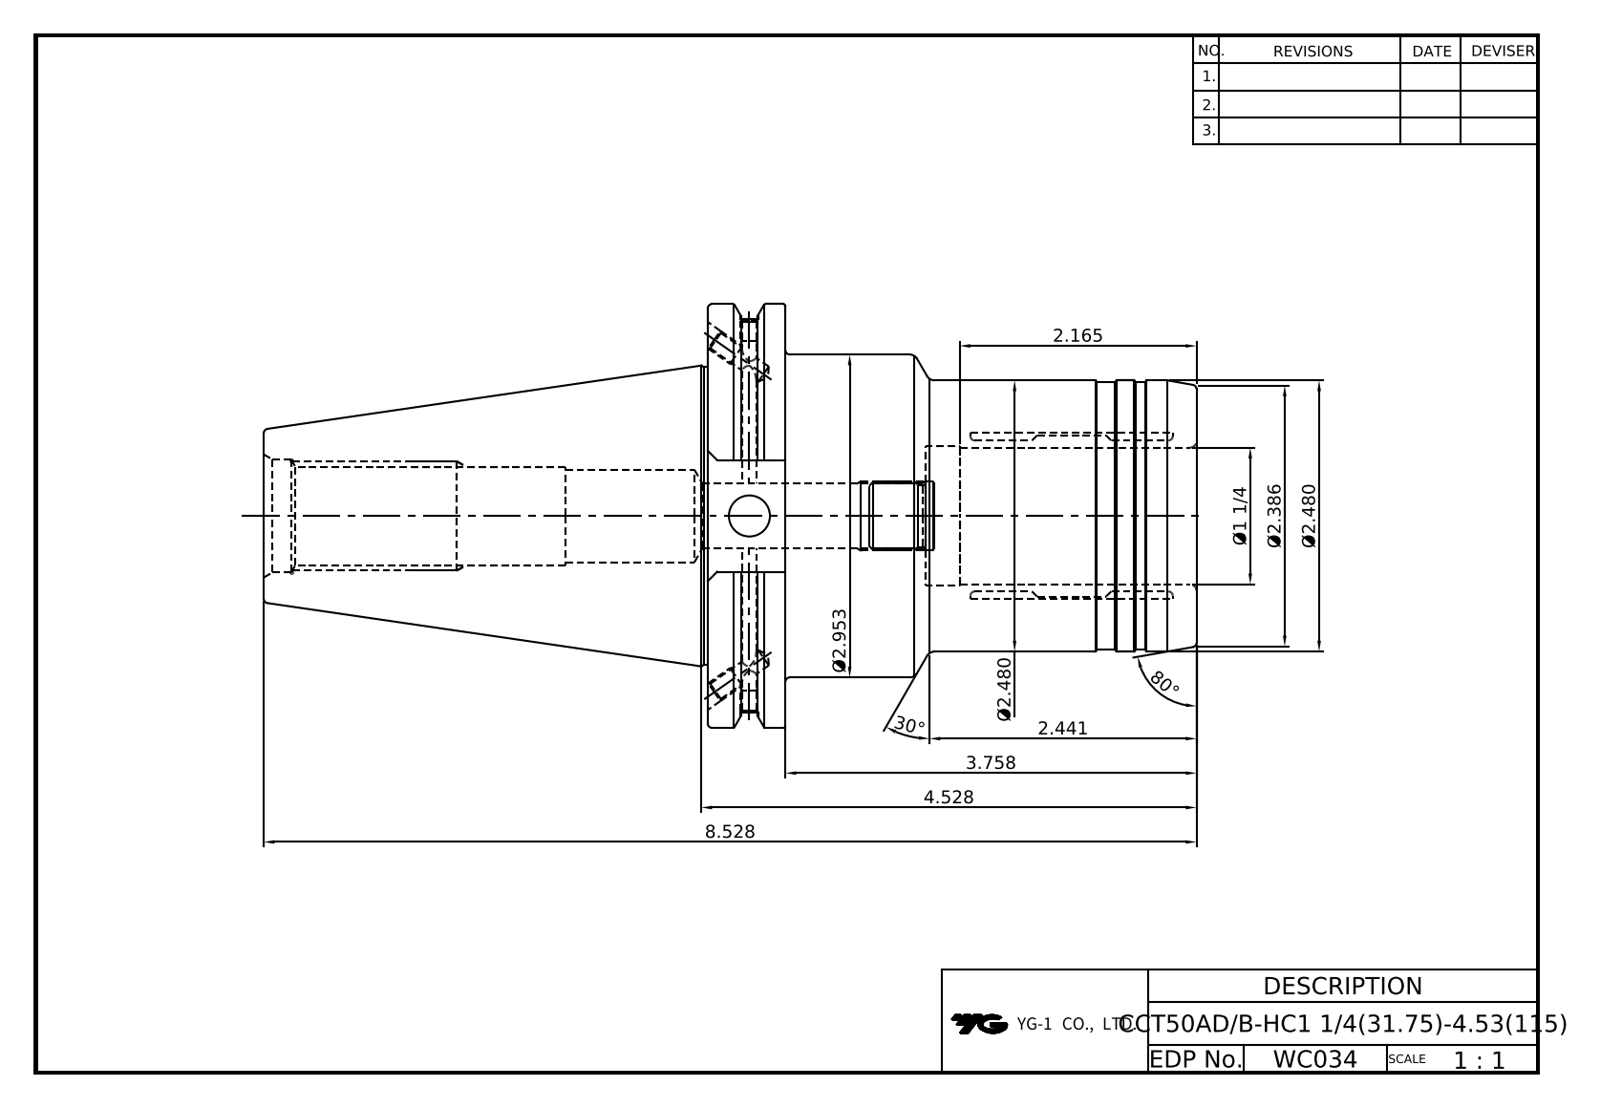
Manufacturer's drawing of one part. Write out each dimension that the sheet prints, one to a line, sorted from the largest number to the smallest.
80°
30°
8.528
4.528
3.758
Ø2.953
Ø2.480
Ø2.480
2.441
Ø2.386
2.165
Ø1 1/4
